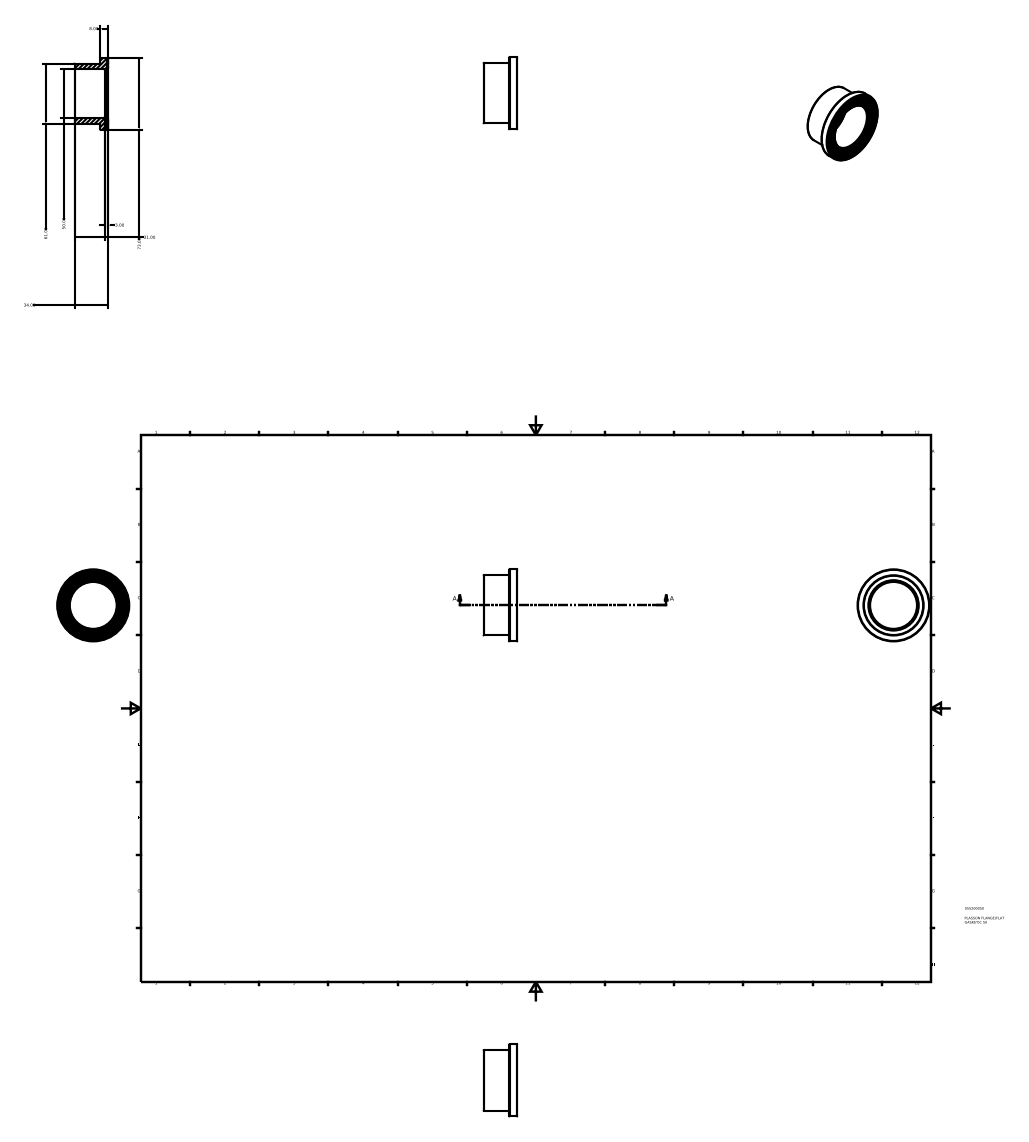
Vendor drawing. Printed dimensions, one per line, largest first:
73.00
61.00
50.00
34.00
31.00
8.00
3.00
